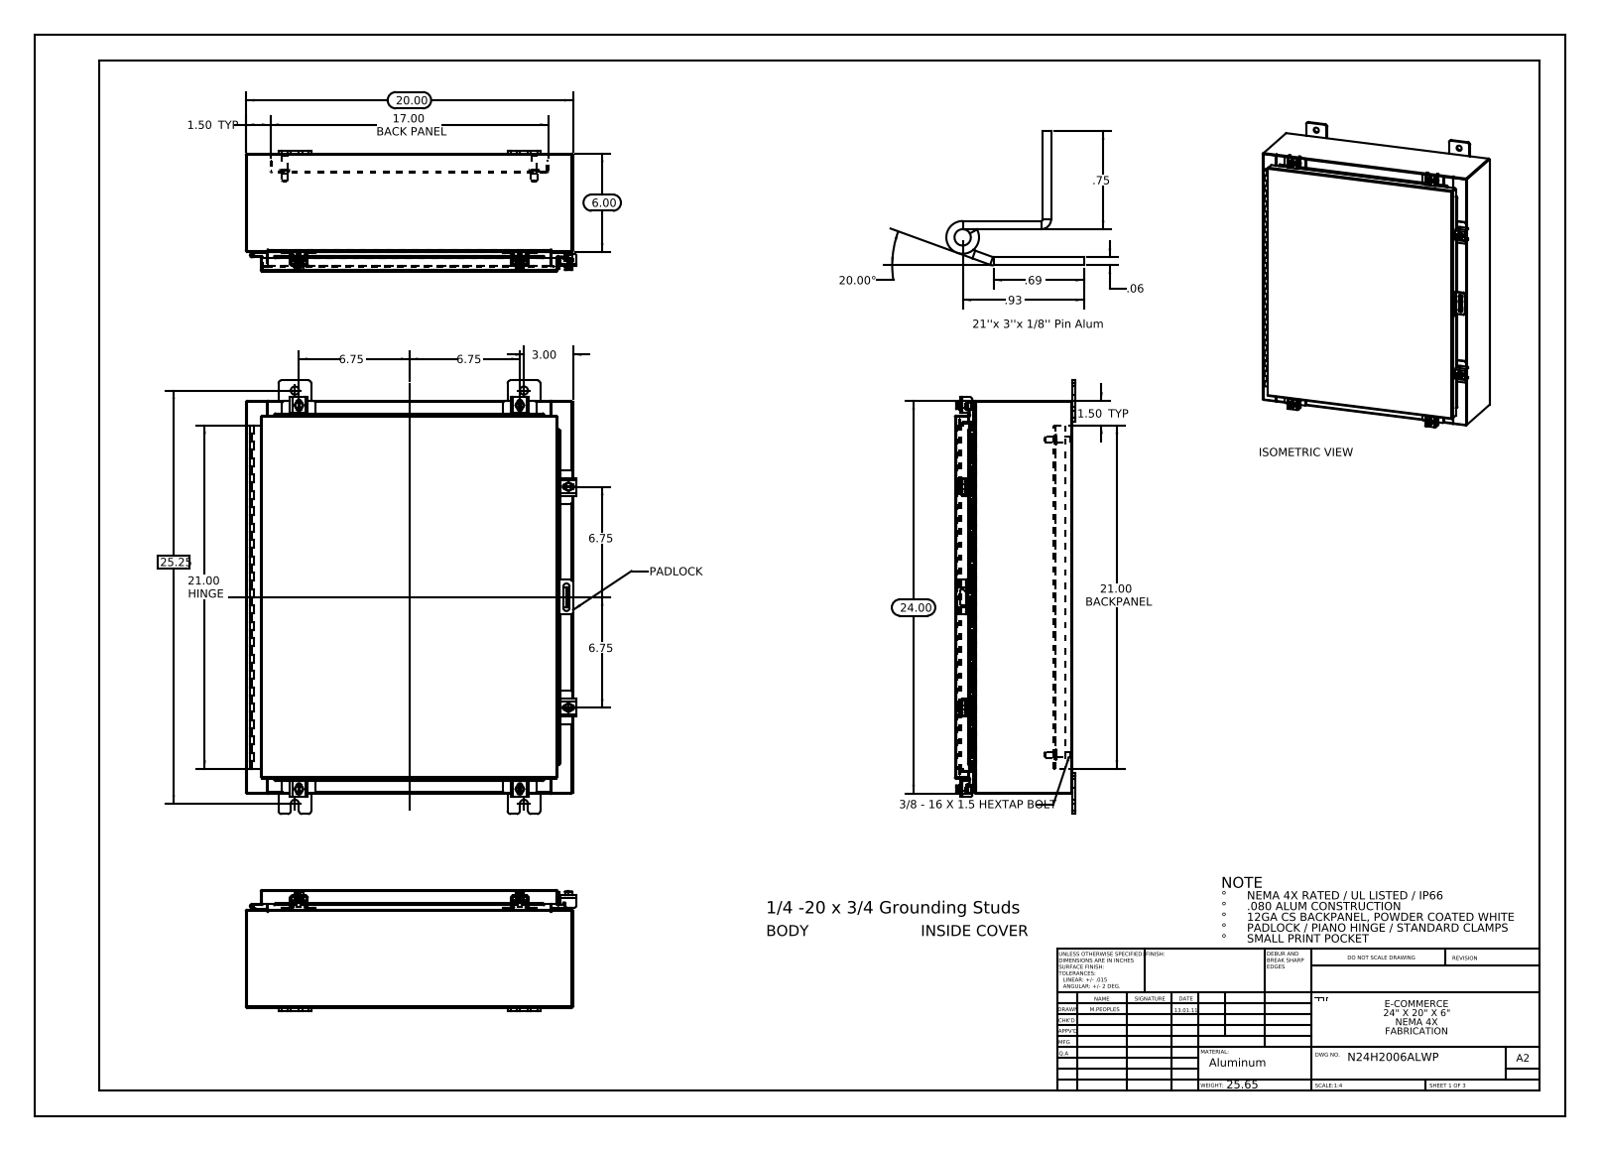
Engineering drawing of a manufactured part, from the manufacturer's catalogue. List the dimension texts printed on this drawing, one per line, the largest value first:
25.25
24.00
21.00 HINGE
21.00 BACKPANEL
20.00
20.00°
17.00 BACK PANEL
6.75
6.75
6.75
6.75
6.00
3.00
1.50 TYP
1.50 TYP
.93
.75
.69
.06
